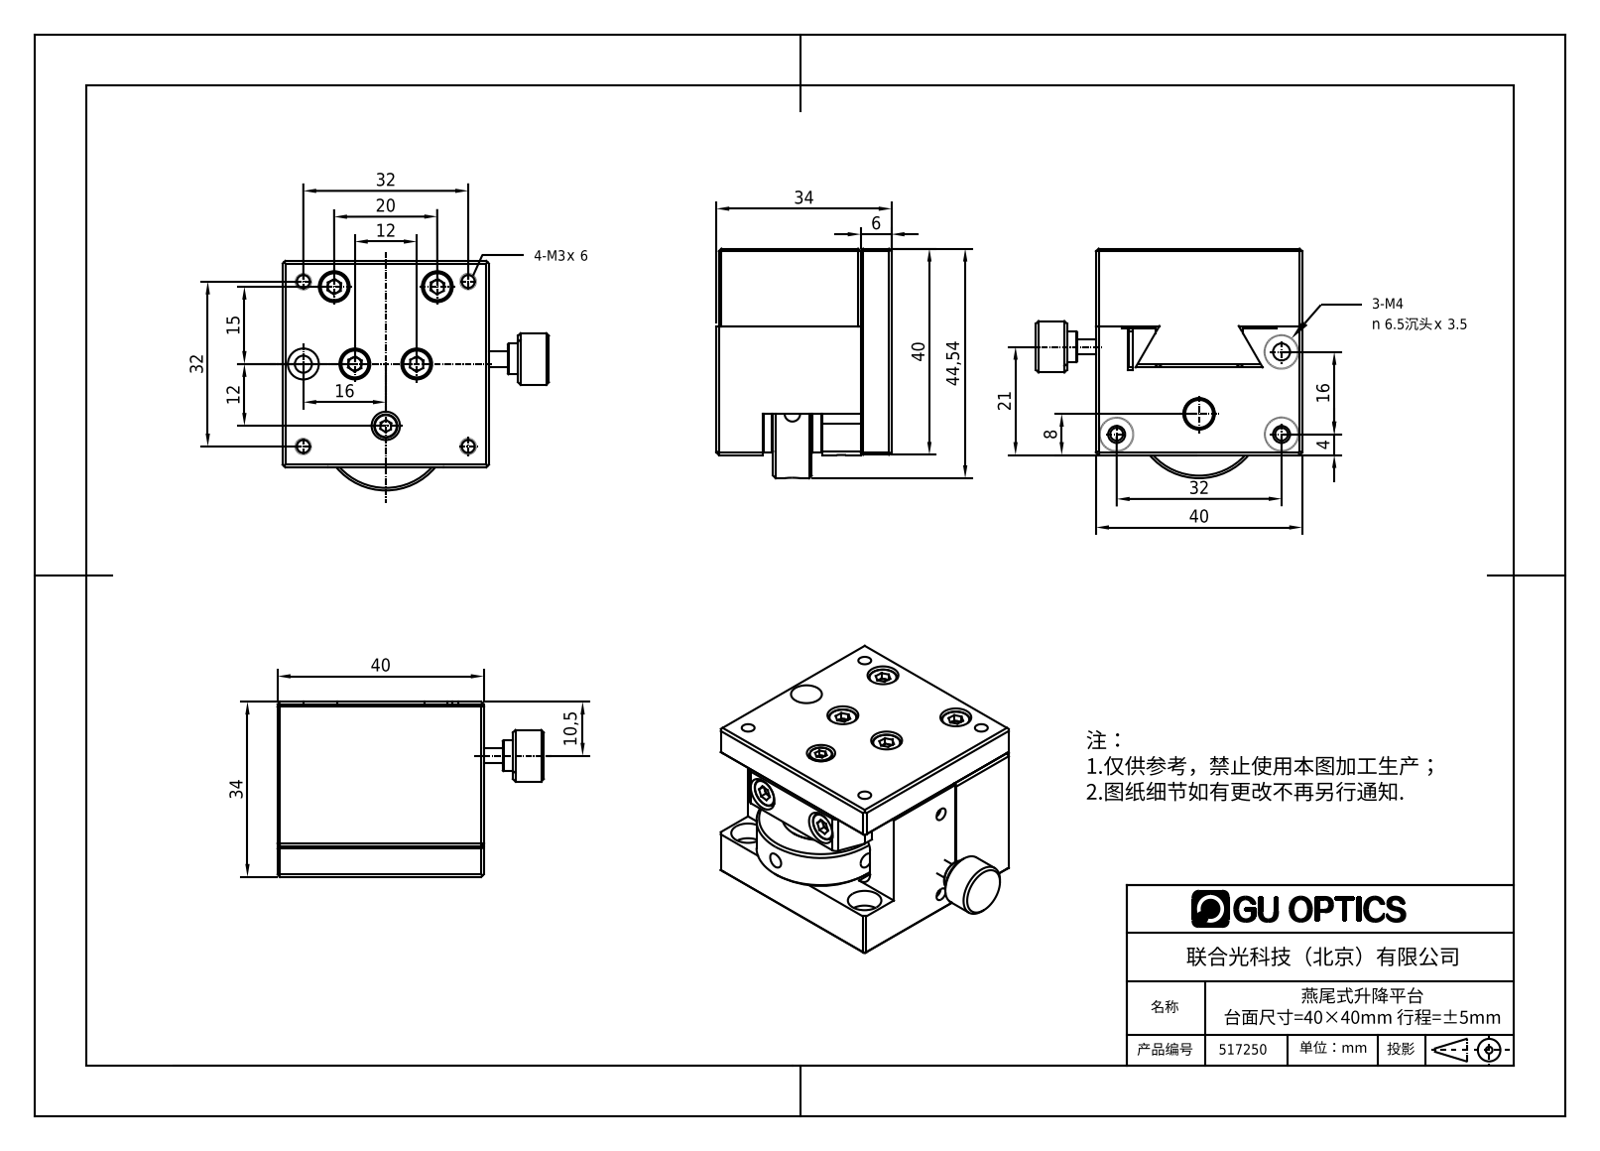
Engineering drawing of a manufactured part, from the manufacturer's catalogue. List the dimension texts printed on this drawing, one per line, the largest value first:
44,54
40
40
40
34
34
32
32
32
21
20
16
16
15
12
12
10,5
8
6
4
